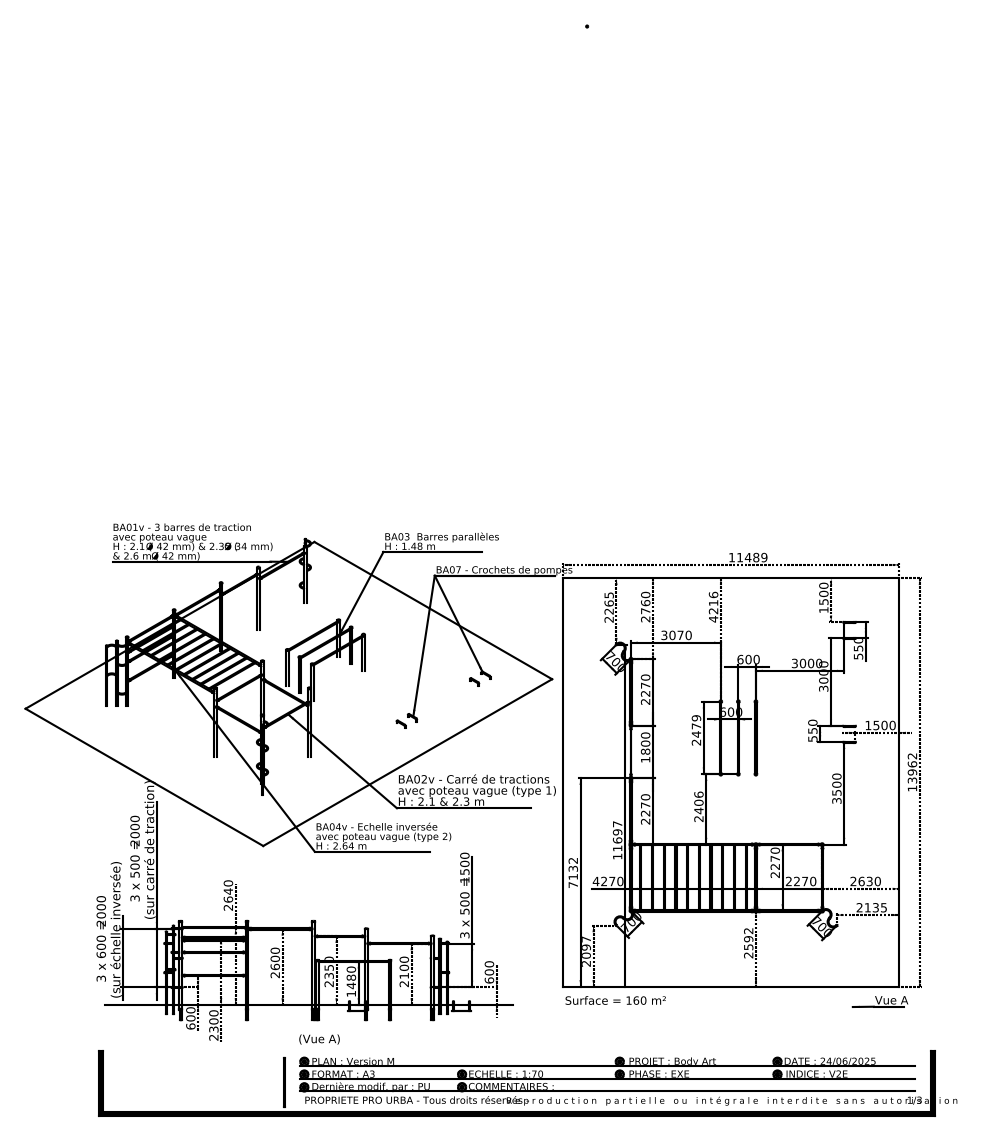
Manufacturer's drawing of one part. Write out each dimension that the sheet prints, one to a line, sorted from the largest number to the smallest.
13962
11697
11489
7132
4270
4216
3500
3070
3000
3000
2760
2640
2630
2600
2592
2479
2406
2350
2300
2270
2270
2270
2270
2265
2135
2100
2097
1800
1500
1500
1480
700
700
700
600
600
3 x 600 = 2000 (sur échelle inversée)
600
600
550
550
3 x 500 = 2000 (sur carré de traction)
3 x 500 = 1500
